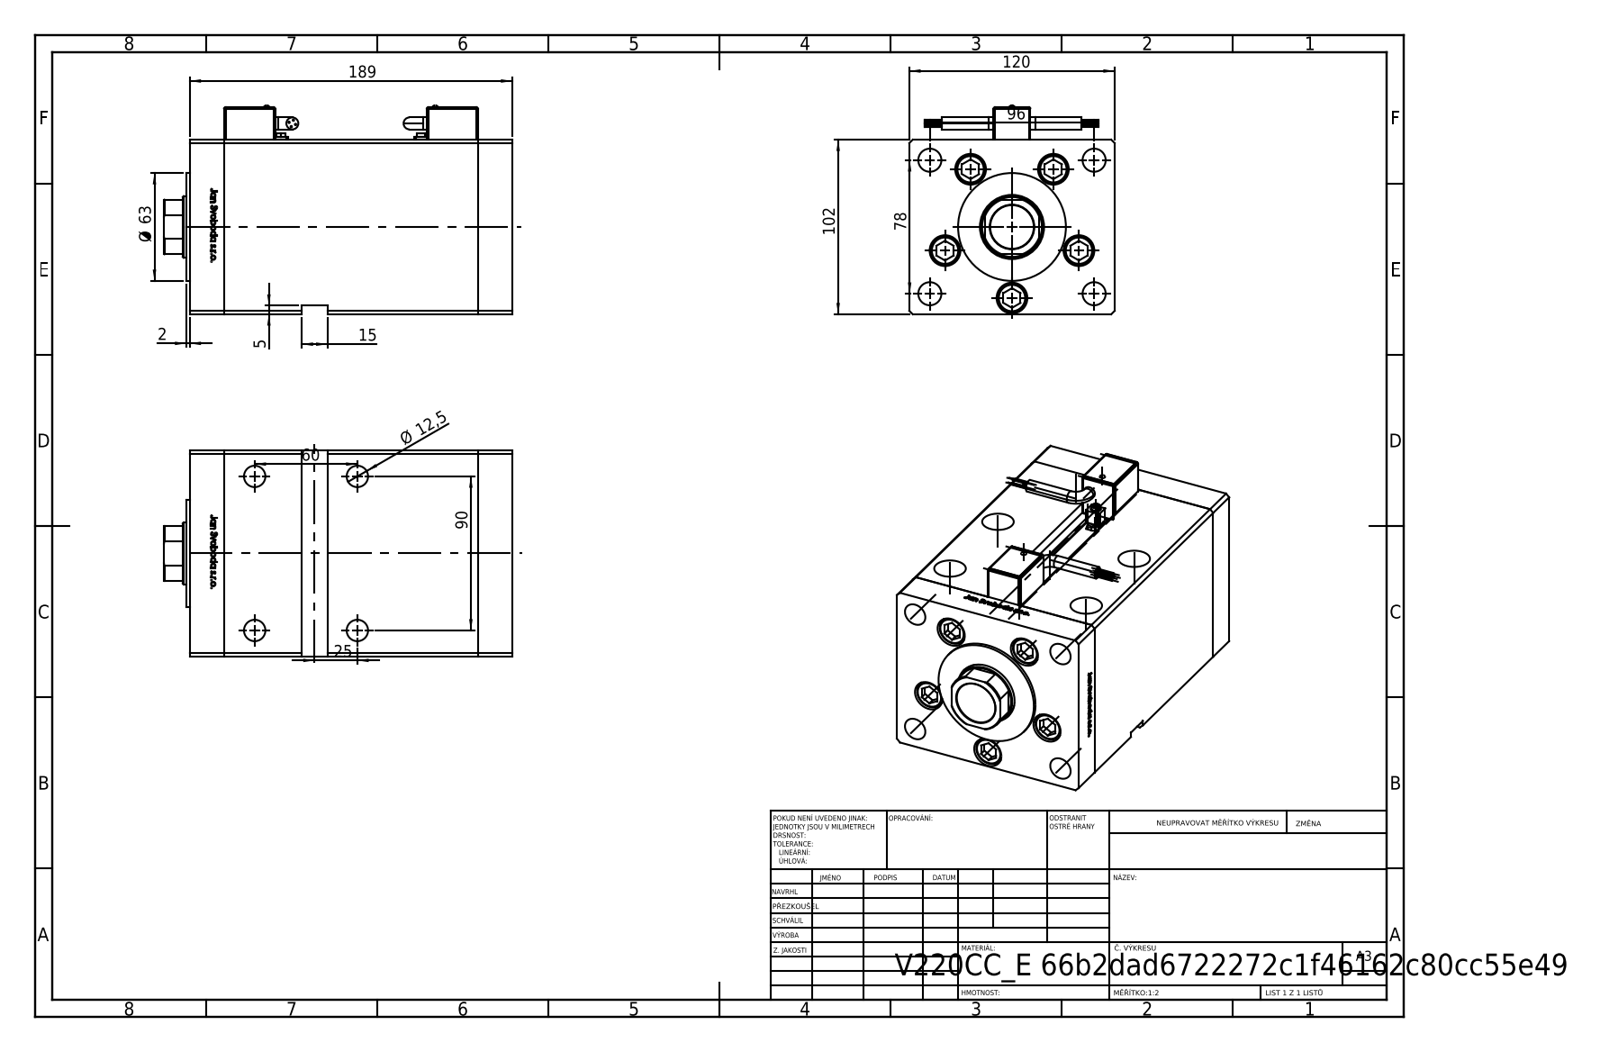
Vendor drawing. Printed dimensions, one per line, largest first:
189
120
102
96
90
78
Ø 63
60
25
15
Ø 12,5
5
2
